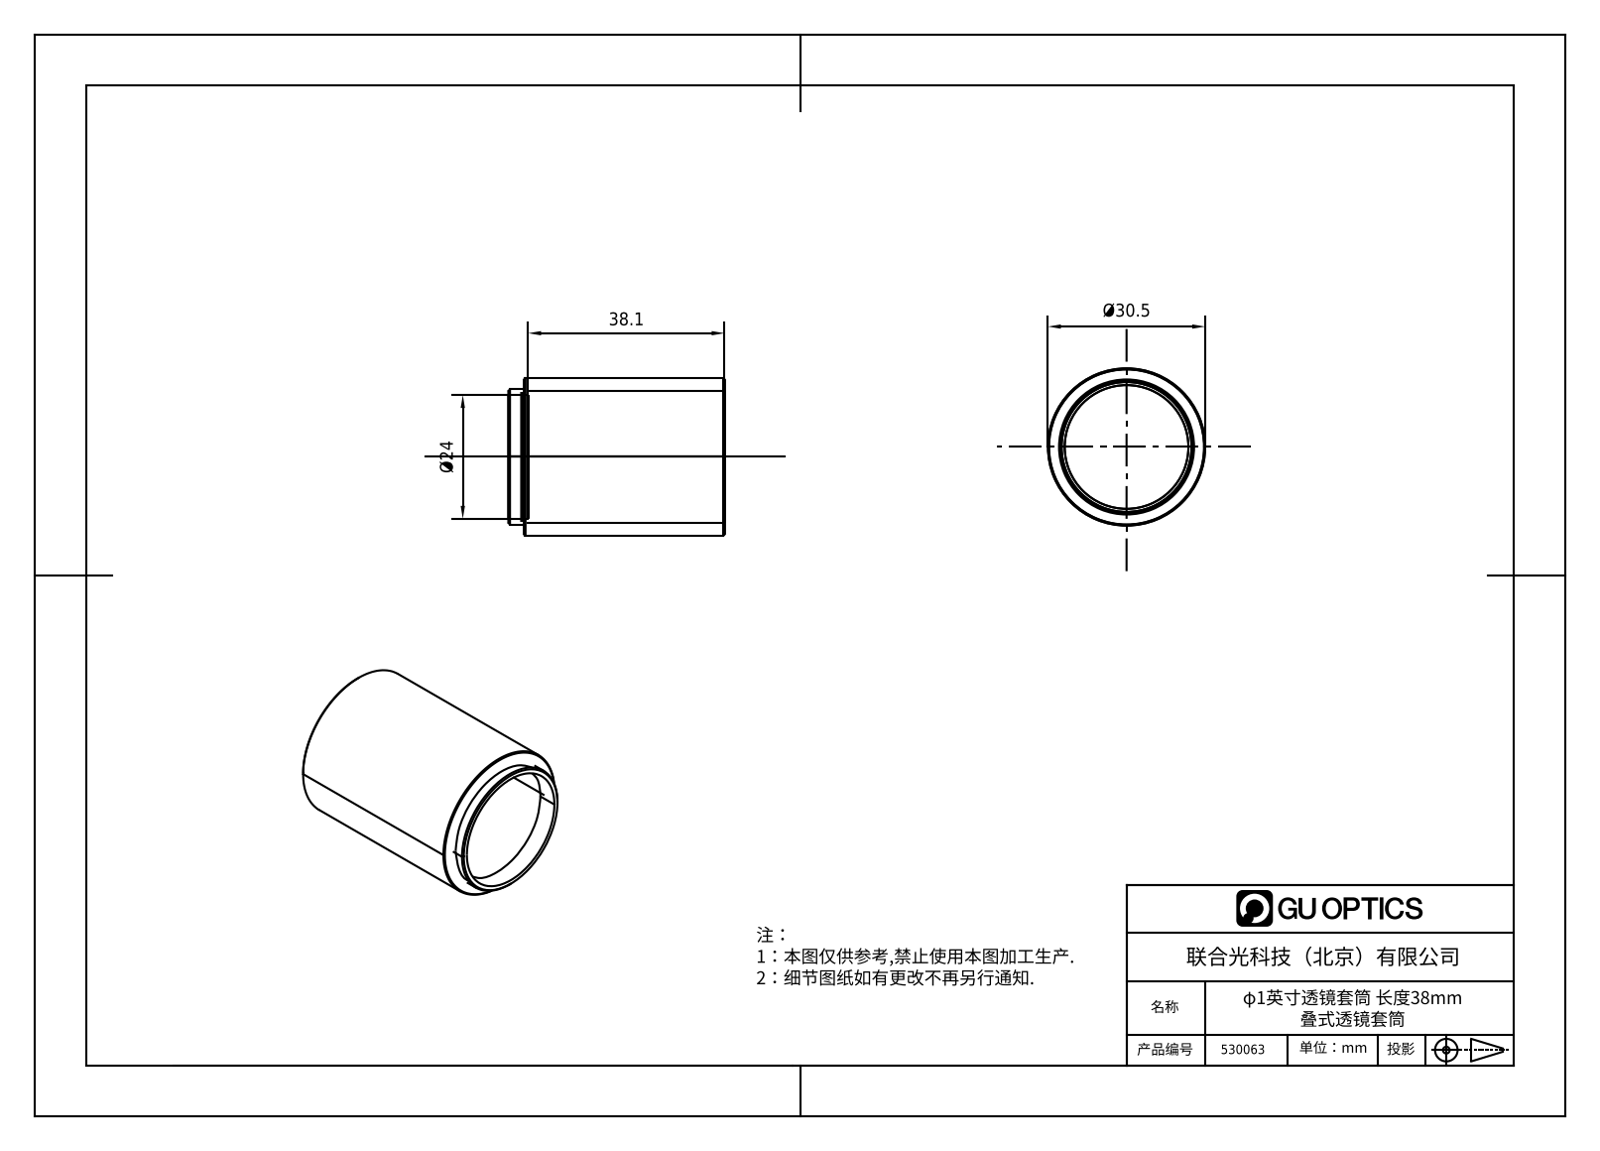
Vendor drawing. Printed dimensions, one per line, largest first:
38.1
Ø30.5
Ø24
